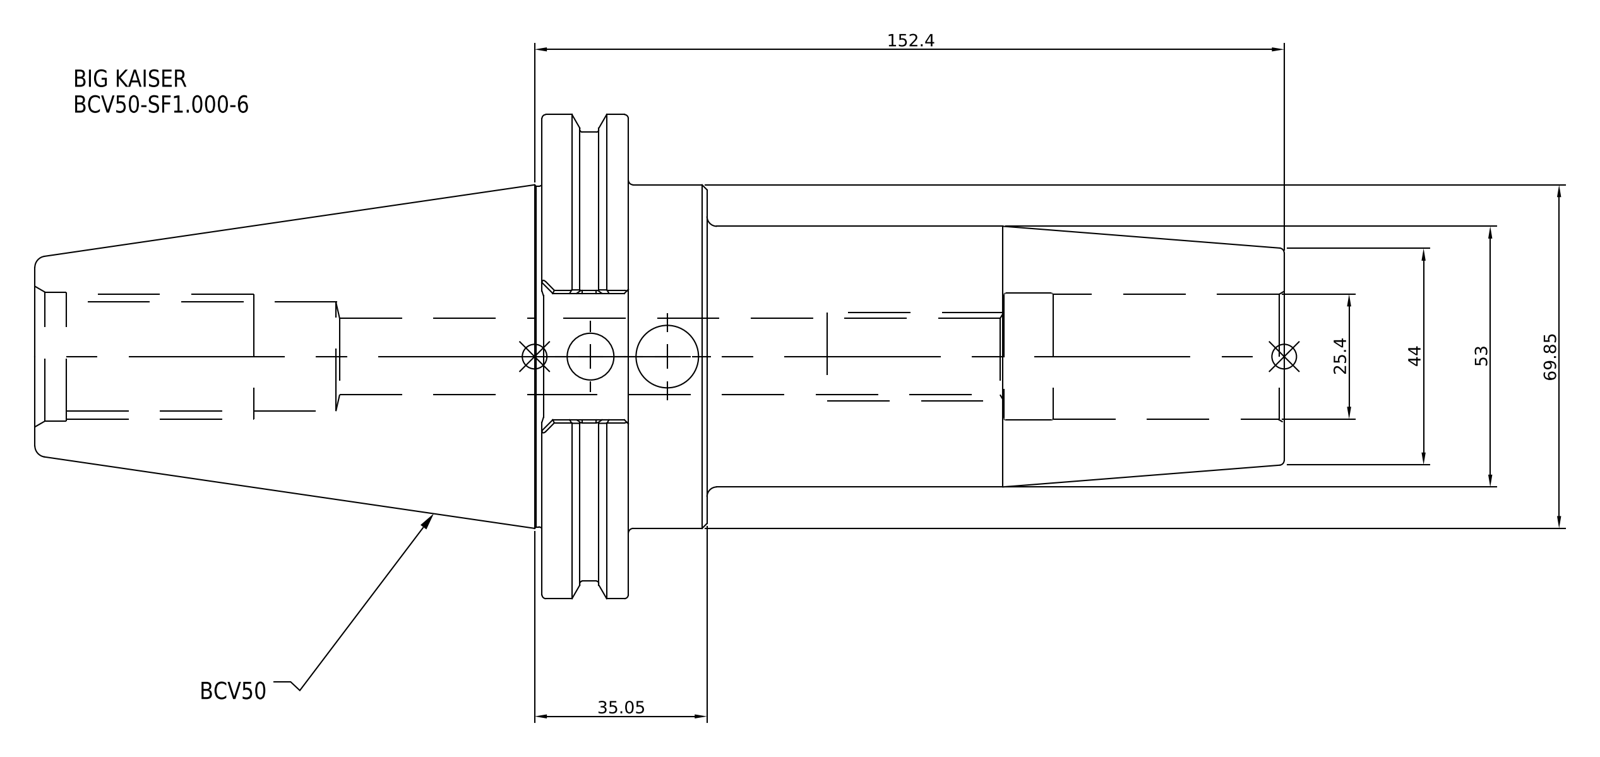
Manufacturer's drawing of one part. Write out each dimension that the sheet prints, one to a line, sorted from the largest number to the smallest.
152.4
69.85
53
44
35.05
25.4
